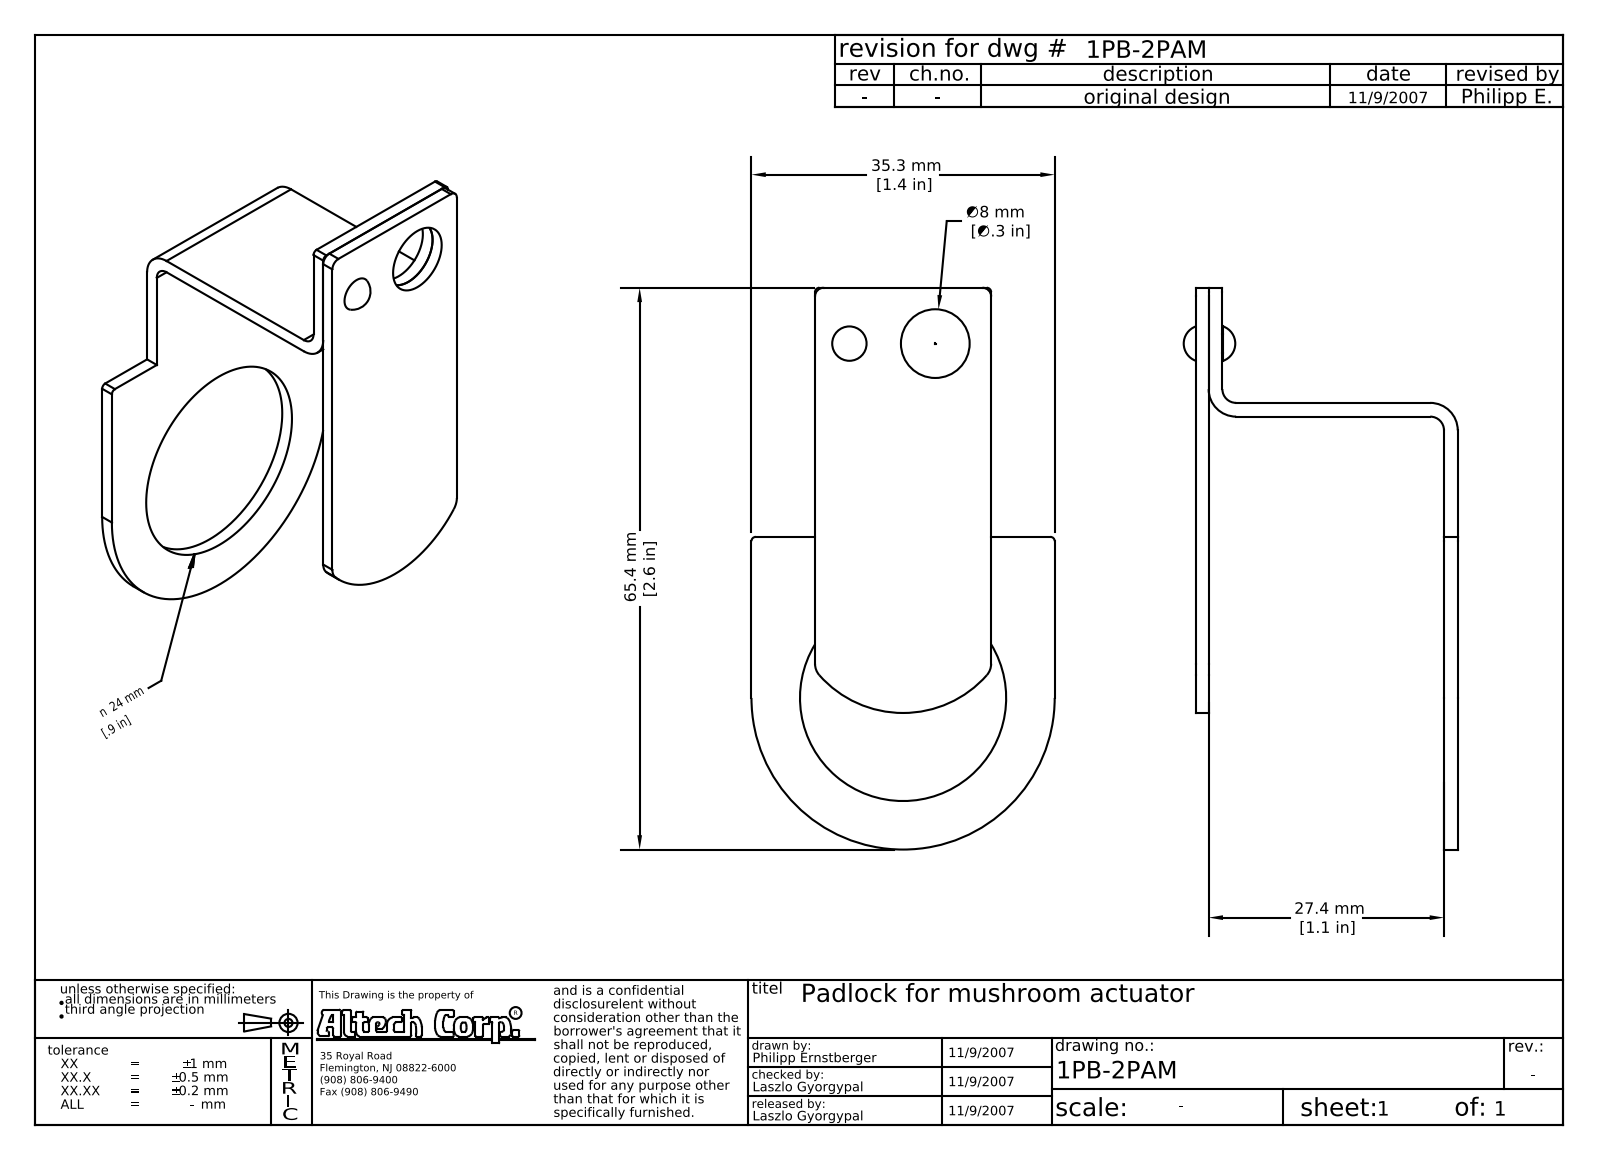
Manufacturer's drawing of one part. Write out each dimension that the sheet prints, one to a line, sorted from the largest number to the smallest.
65.4
35.3
27.4
8.00
